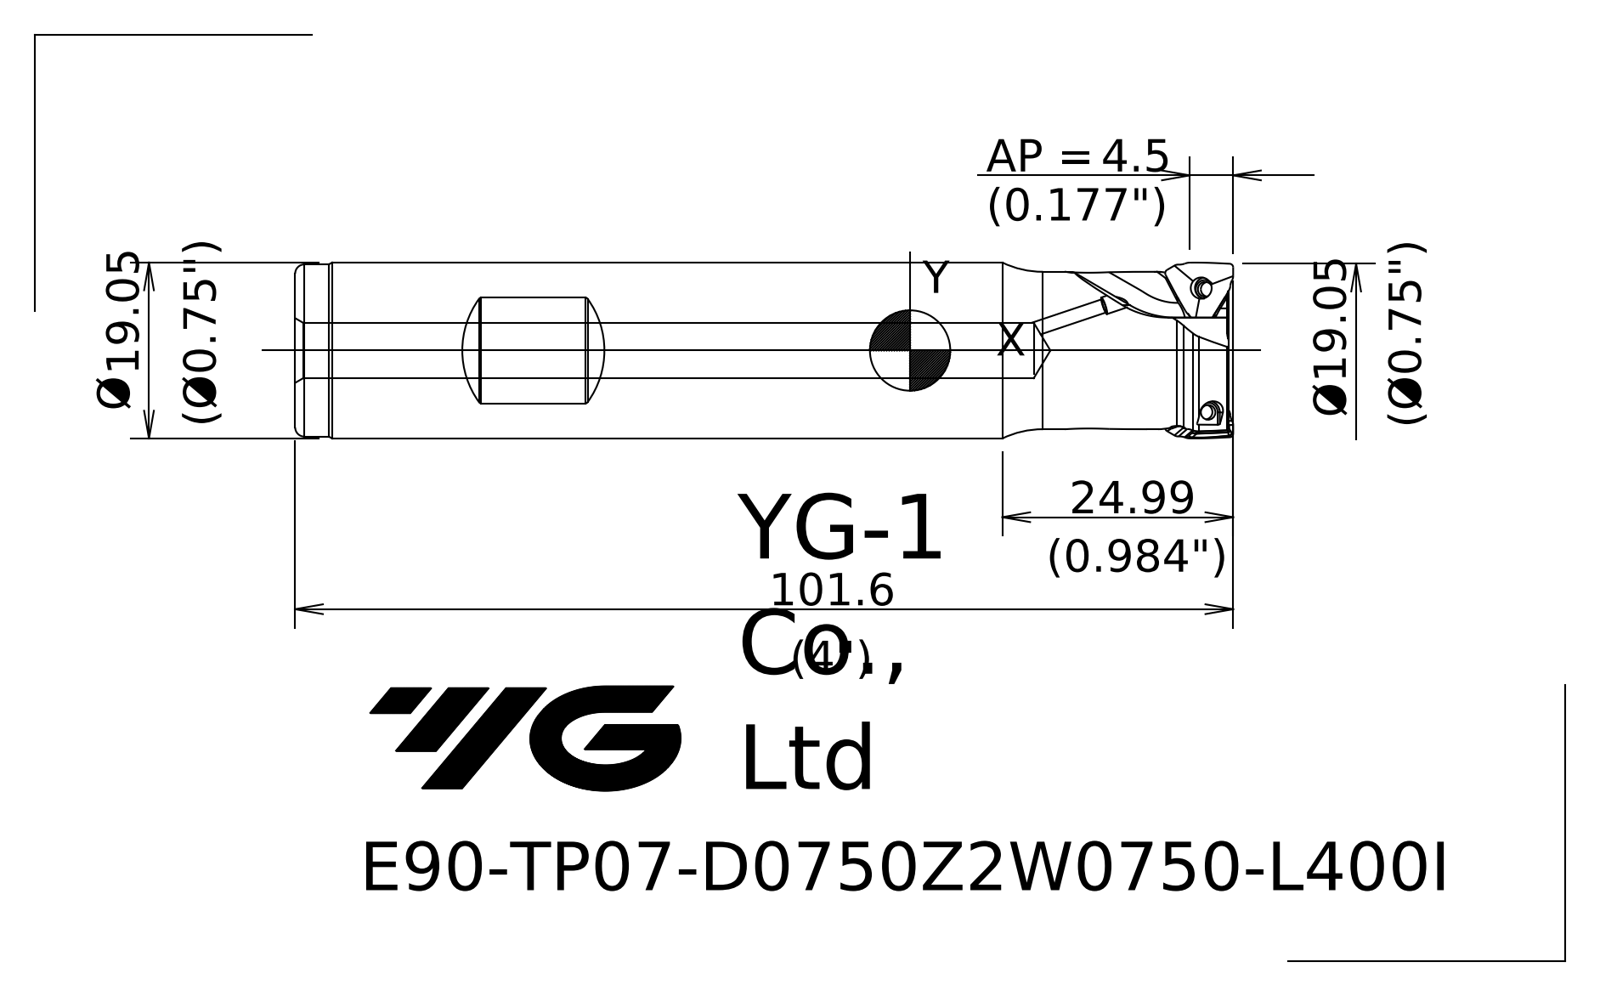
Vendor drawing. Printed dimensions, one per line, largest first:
101.6
24.99
Ø19.05
4.5 AP =
